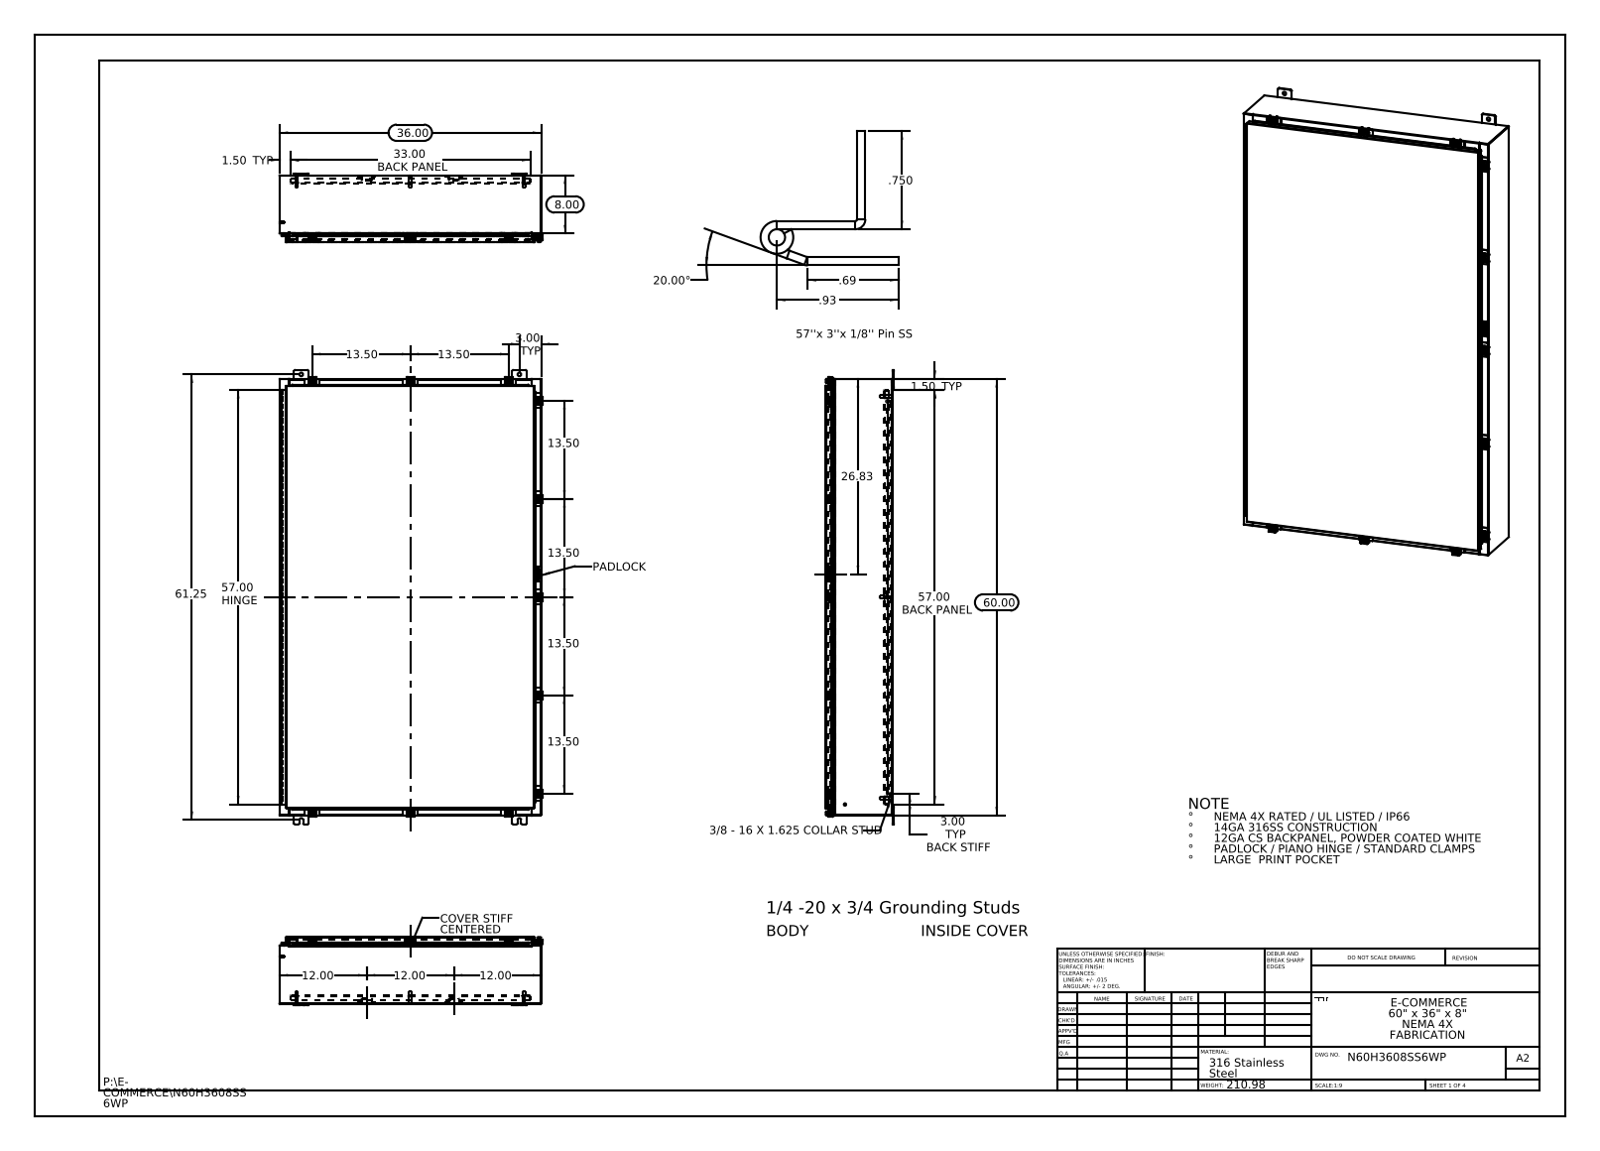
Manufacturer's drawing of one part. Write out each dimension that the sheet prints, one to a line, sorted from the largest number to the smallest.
61.25
60.00
57.00 HINGE
57.00 BACK PANEL
36.00
33.00 BACK PANEL
26.83
20.00°
13.50
13.50
13.50
13.50
13.50
13.50
12.00
12.00
12.00
8.00
3.00 TYP
3.00 TYP BACK STIFF
1.50 TYP
1.50 TYP
.93
.750
.69
